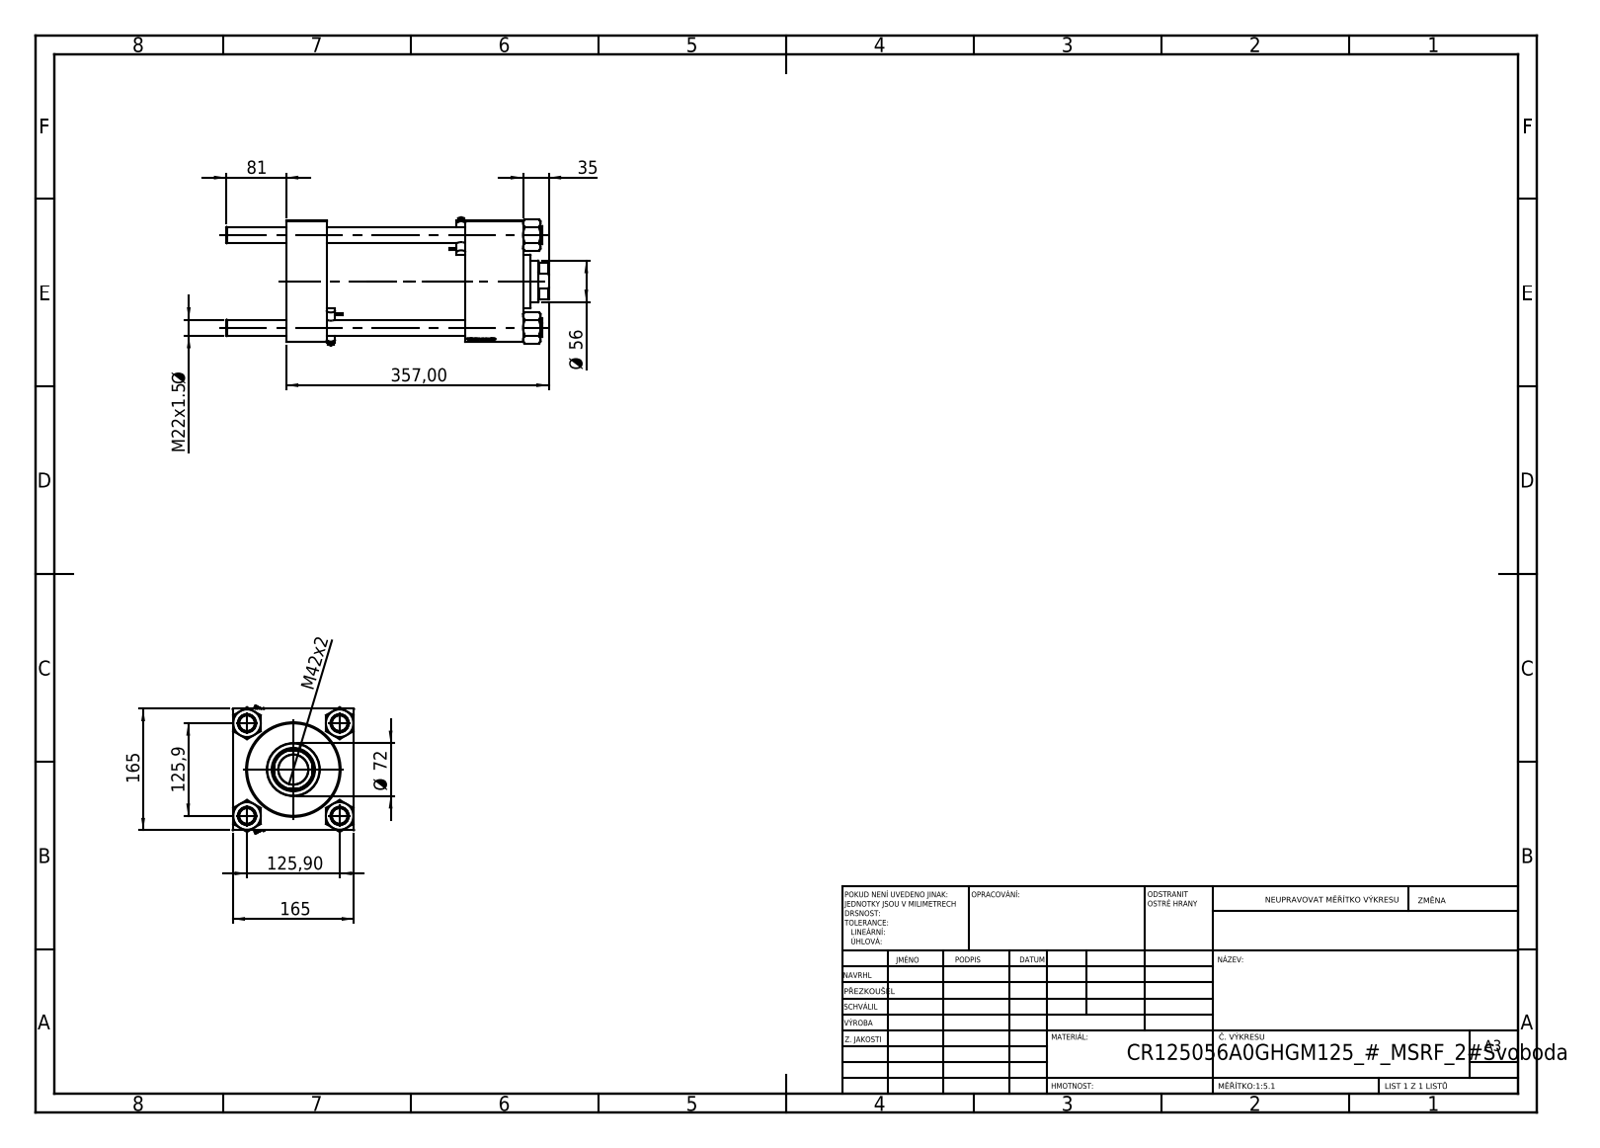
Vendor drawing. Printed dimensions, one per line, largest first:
357,00
165
165
125,9
125,90
81
Ø 72
Ø 56
M42x2
35
M22x1.5 Ø
